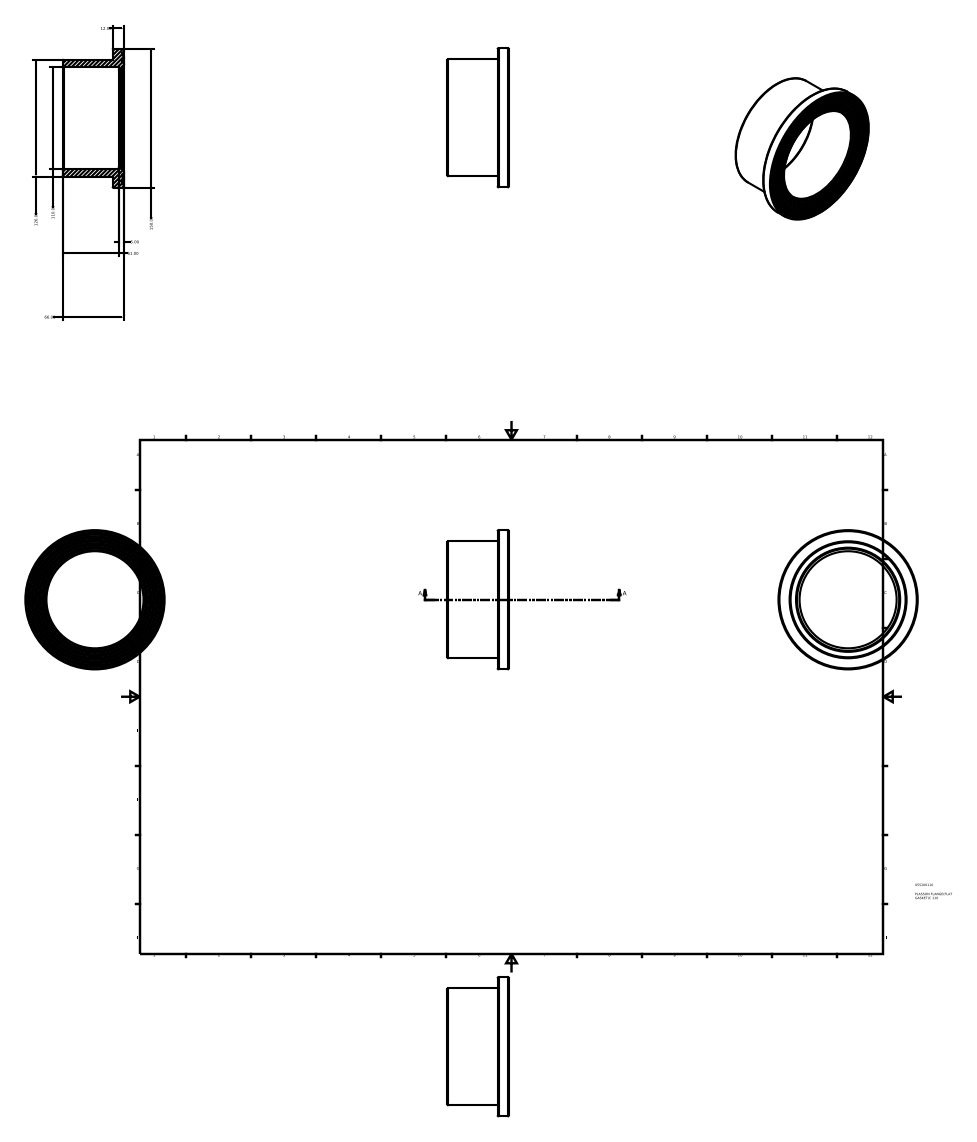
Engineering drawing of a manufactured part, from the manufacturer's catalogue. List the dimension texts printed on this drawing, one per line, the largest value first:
150.00
126.00
110.00
66.00
61.00
12.00
5.00
